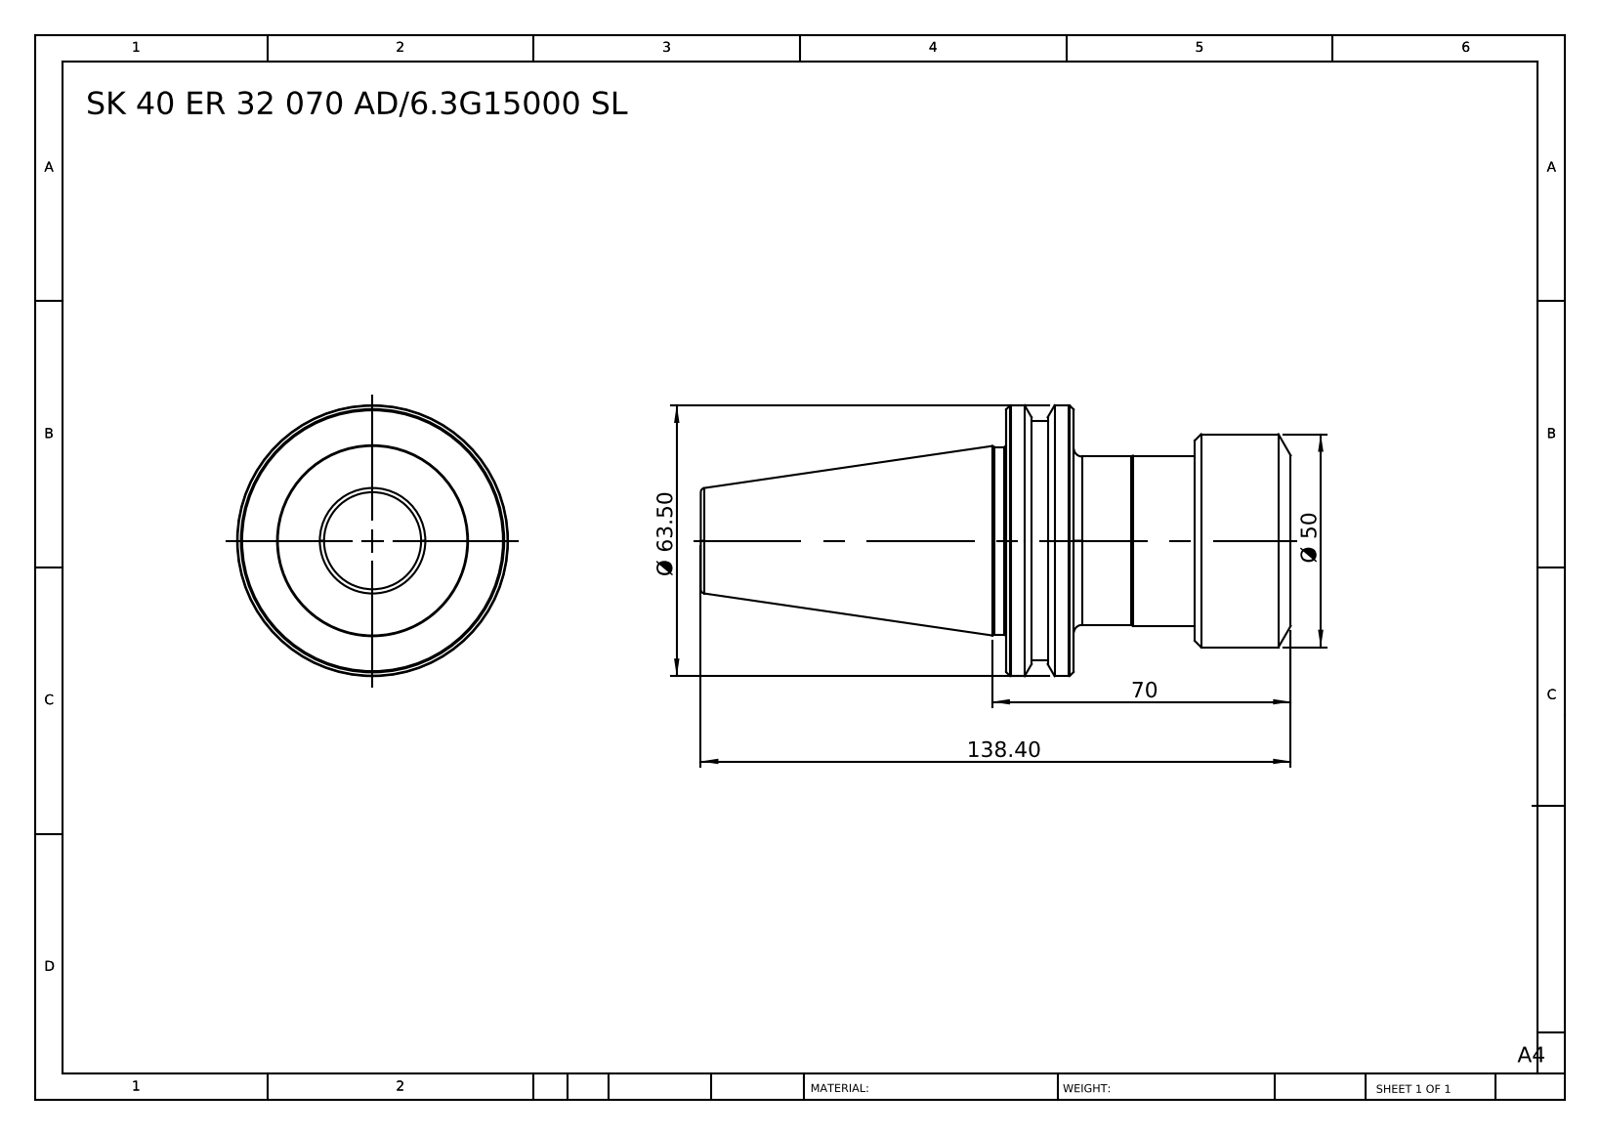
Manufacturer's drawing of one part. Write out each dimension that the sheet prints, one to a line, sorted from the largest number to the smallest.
138.40
70
Ø 63.50
Ø 50
